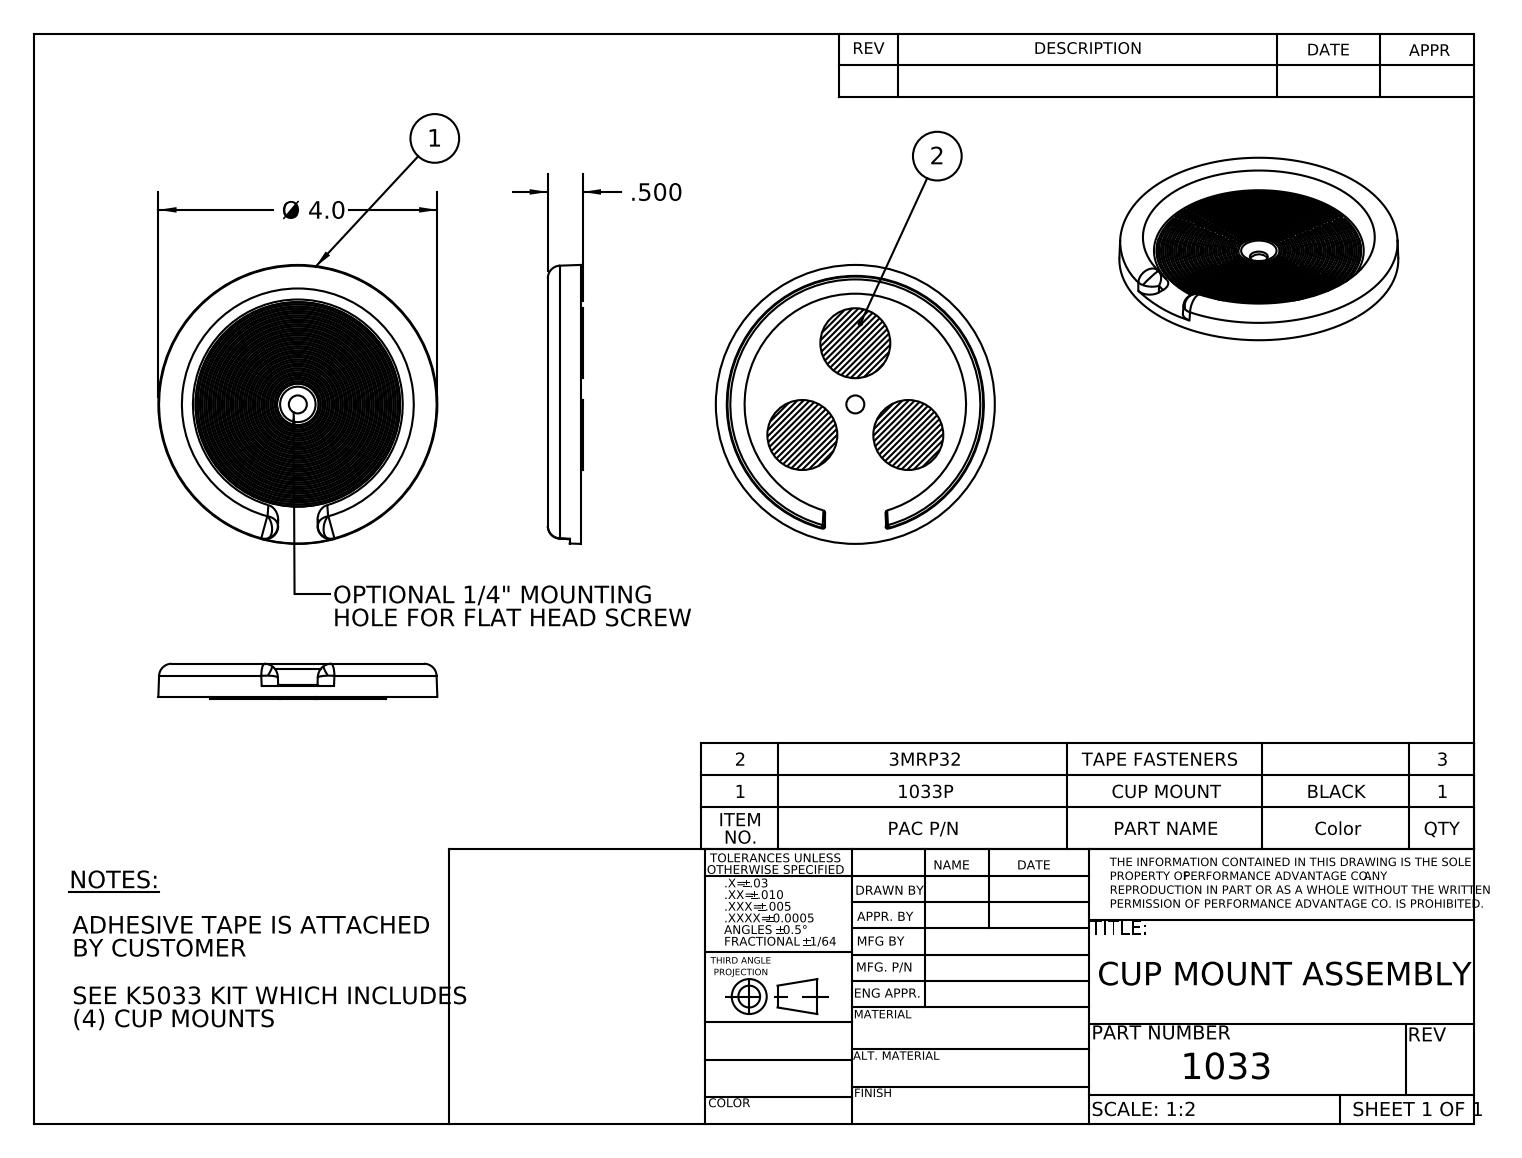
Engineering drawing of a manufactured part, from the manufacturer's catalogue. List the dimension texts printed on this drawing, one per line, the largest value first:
Ø 4.0
.500
